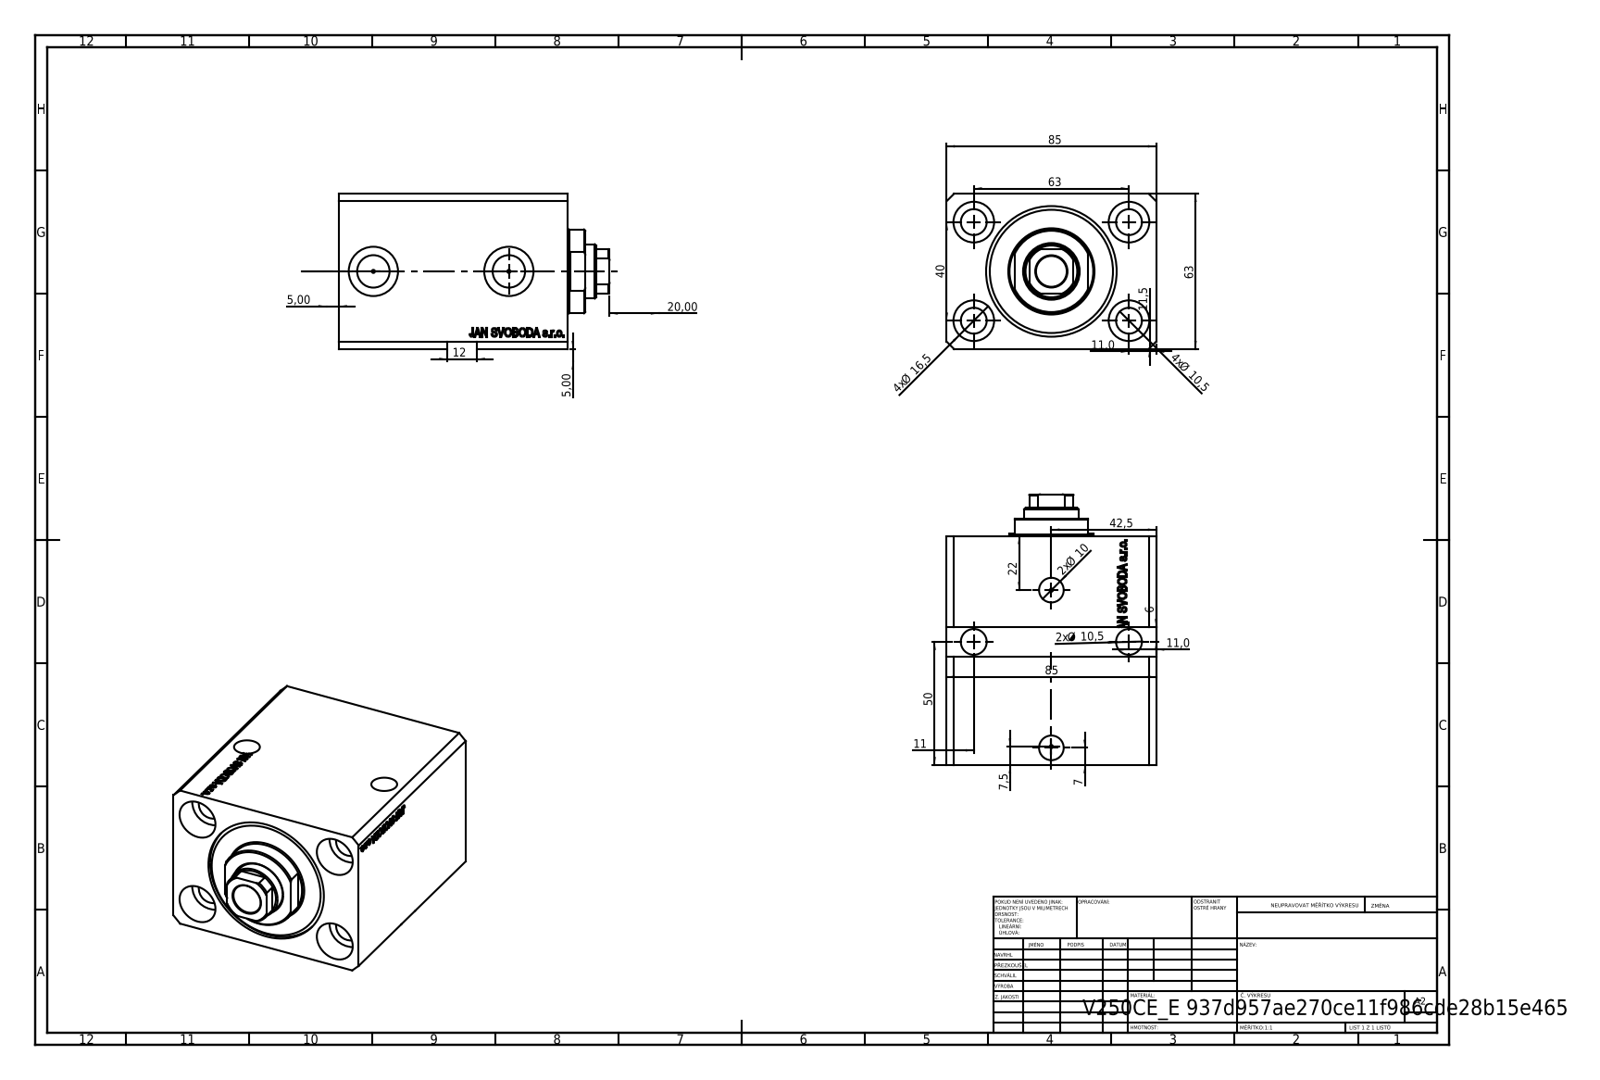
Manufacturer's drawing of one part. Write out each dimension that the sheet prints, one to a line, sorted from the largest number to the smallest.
85
85
63
63
50
42,5
40
22
20,00
4x Ø 16,5
12
11,5
11,0
11,0
11
4x Ø 10,5
2x Ø 10,5
2x Ø 10
7,5
7
6
5,00
5,00
